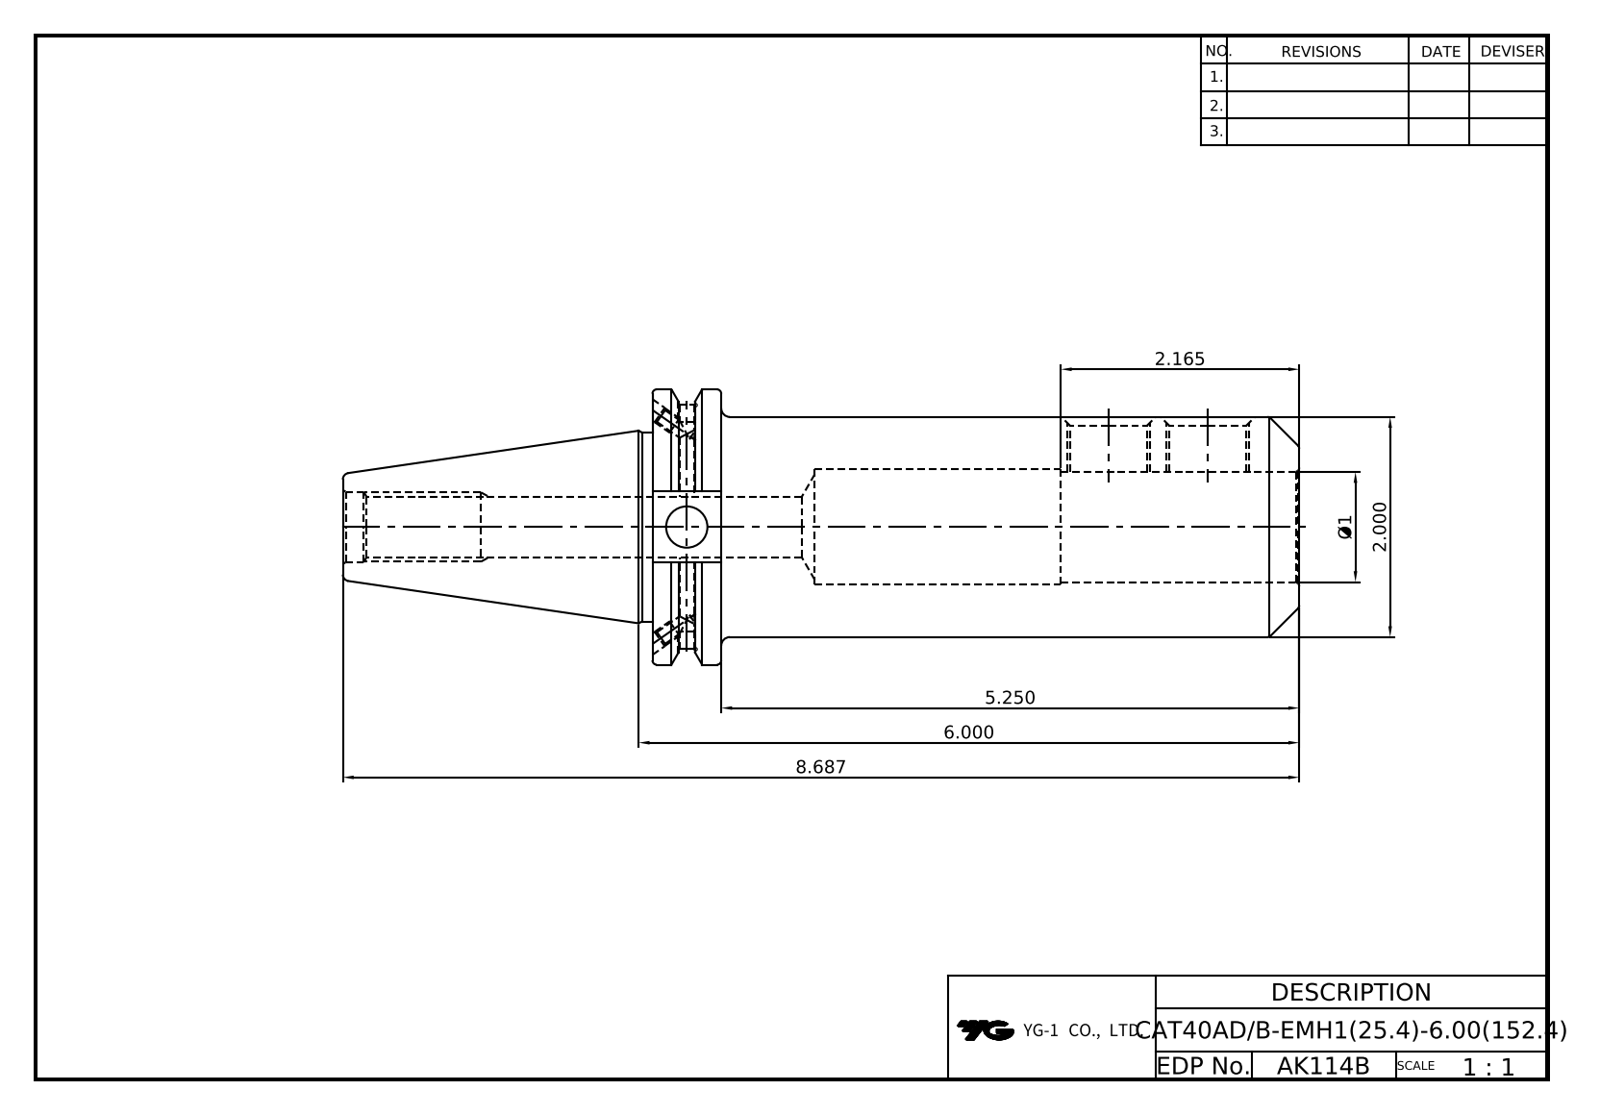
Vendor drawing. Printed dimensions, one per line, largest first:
8.687
6.000
5.250
2.165
2.000
Ø1
